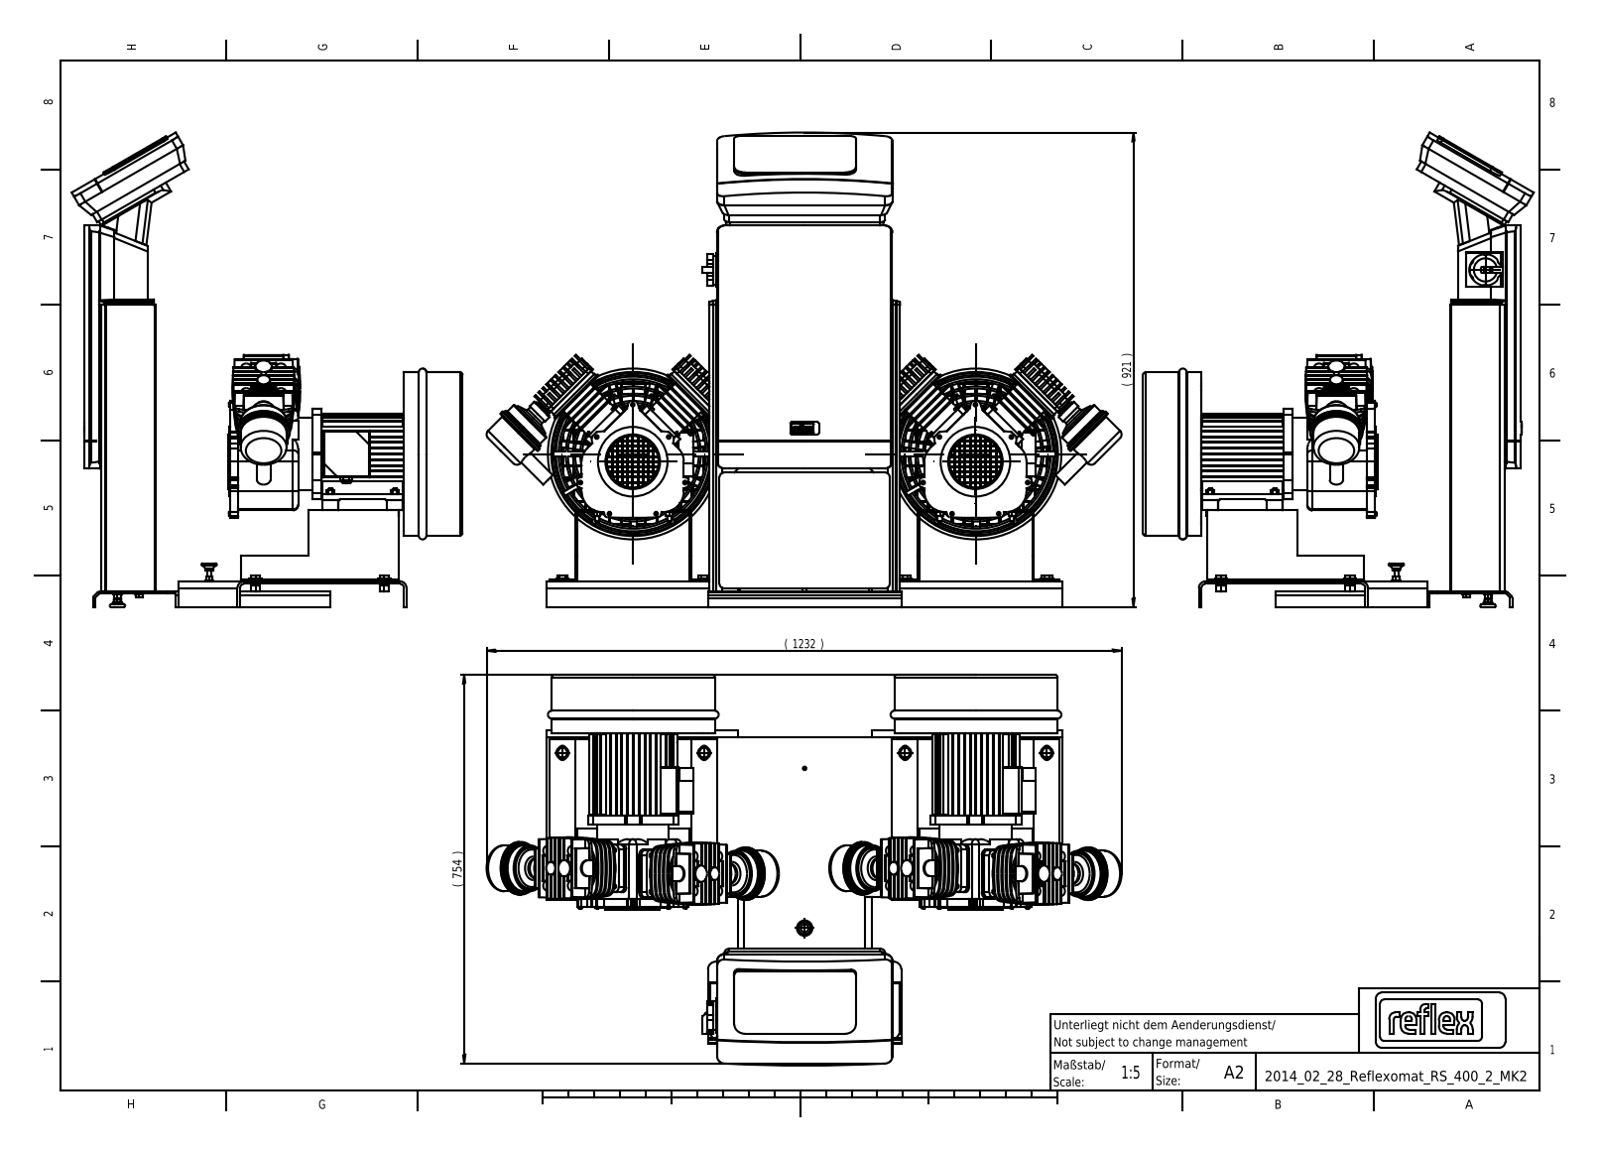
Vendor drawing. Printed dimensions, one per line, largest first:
1232 ( )
921 ( )
754 ( )
